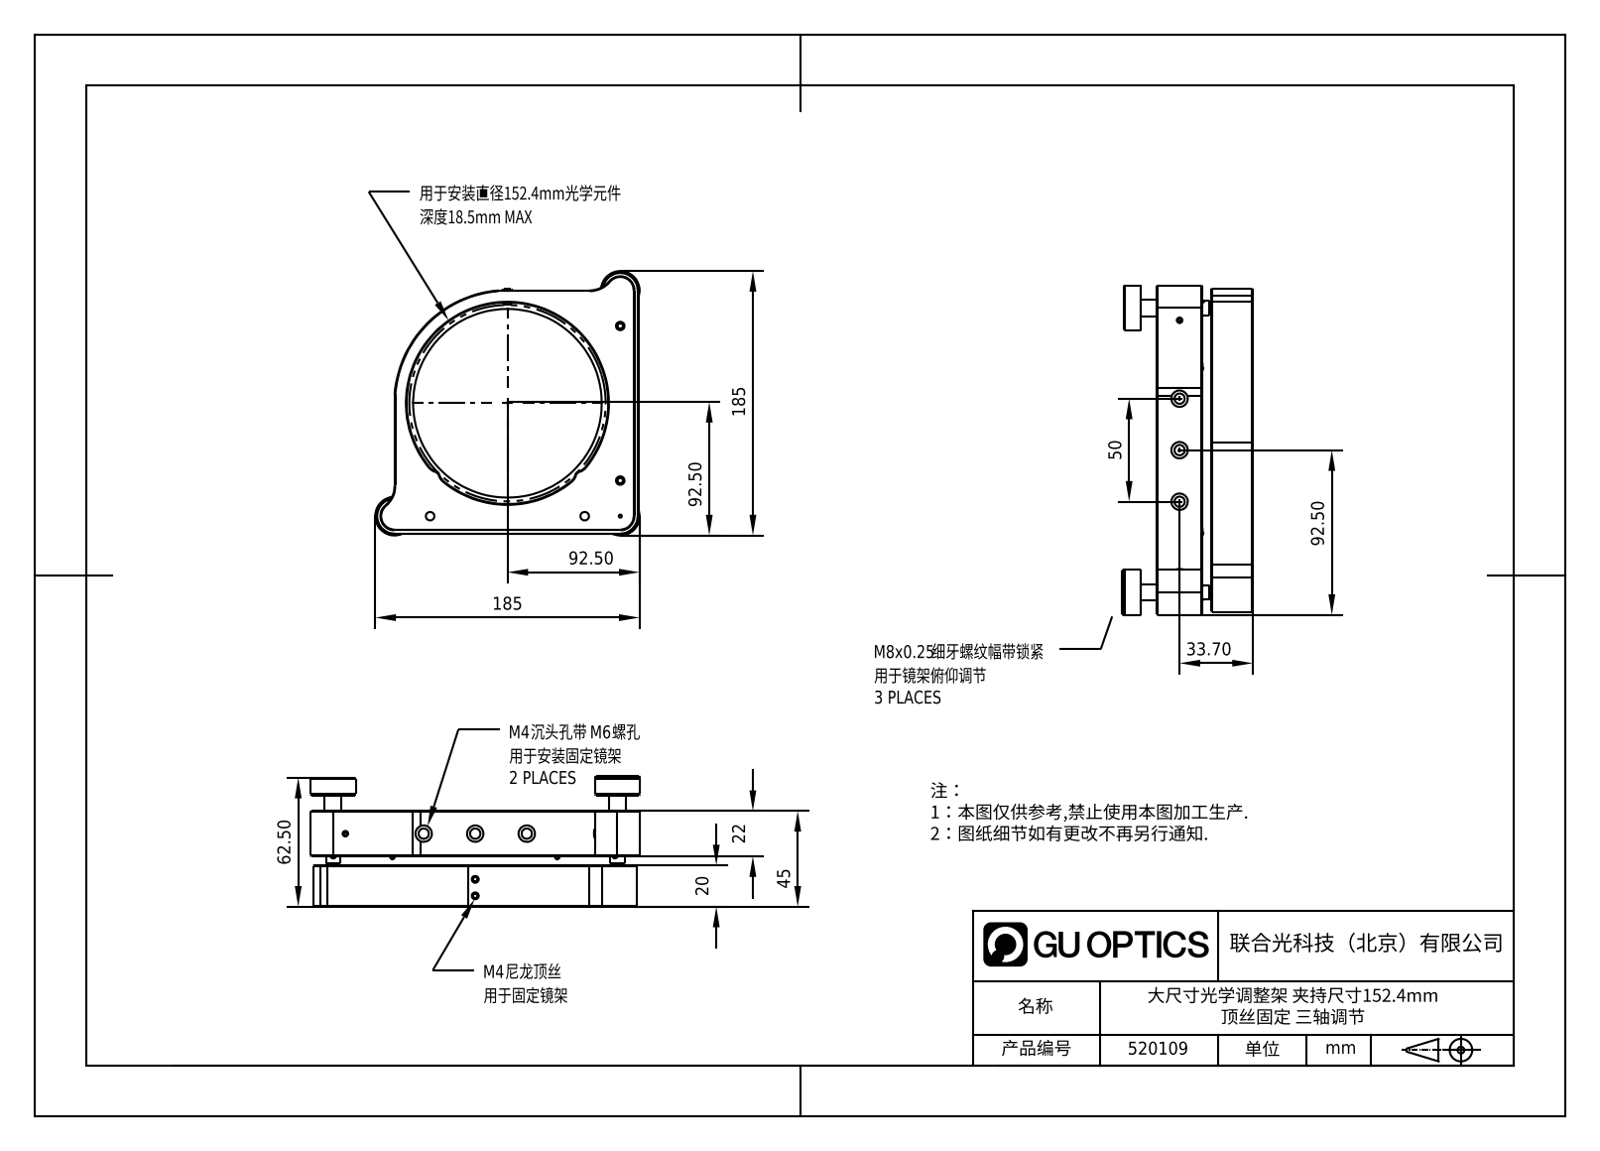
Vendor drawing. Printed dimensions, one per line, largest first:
185
185
92.50
92.50
92.50
62.50
50
45
33.70
22
20
